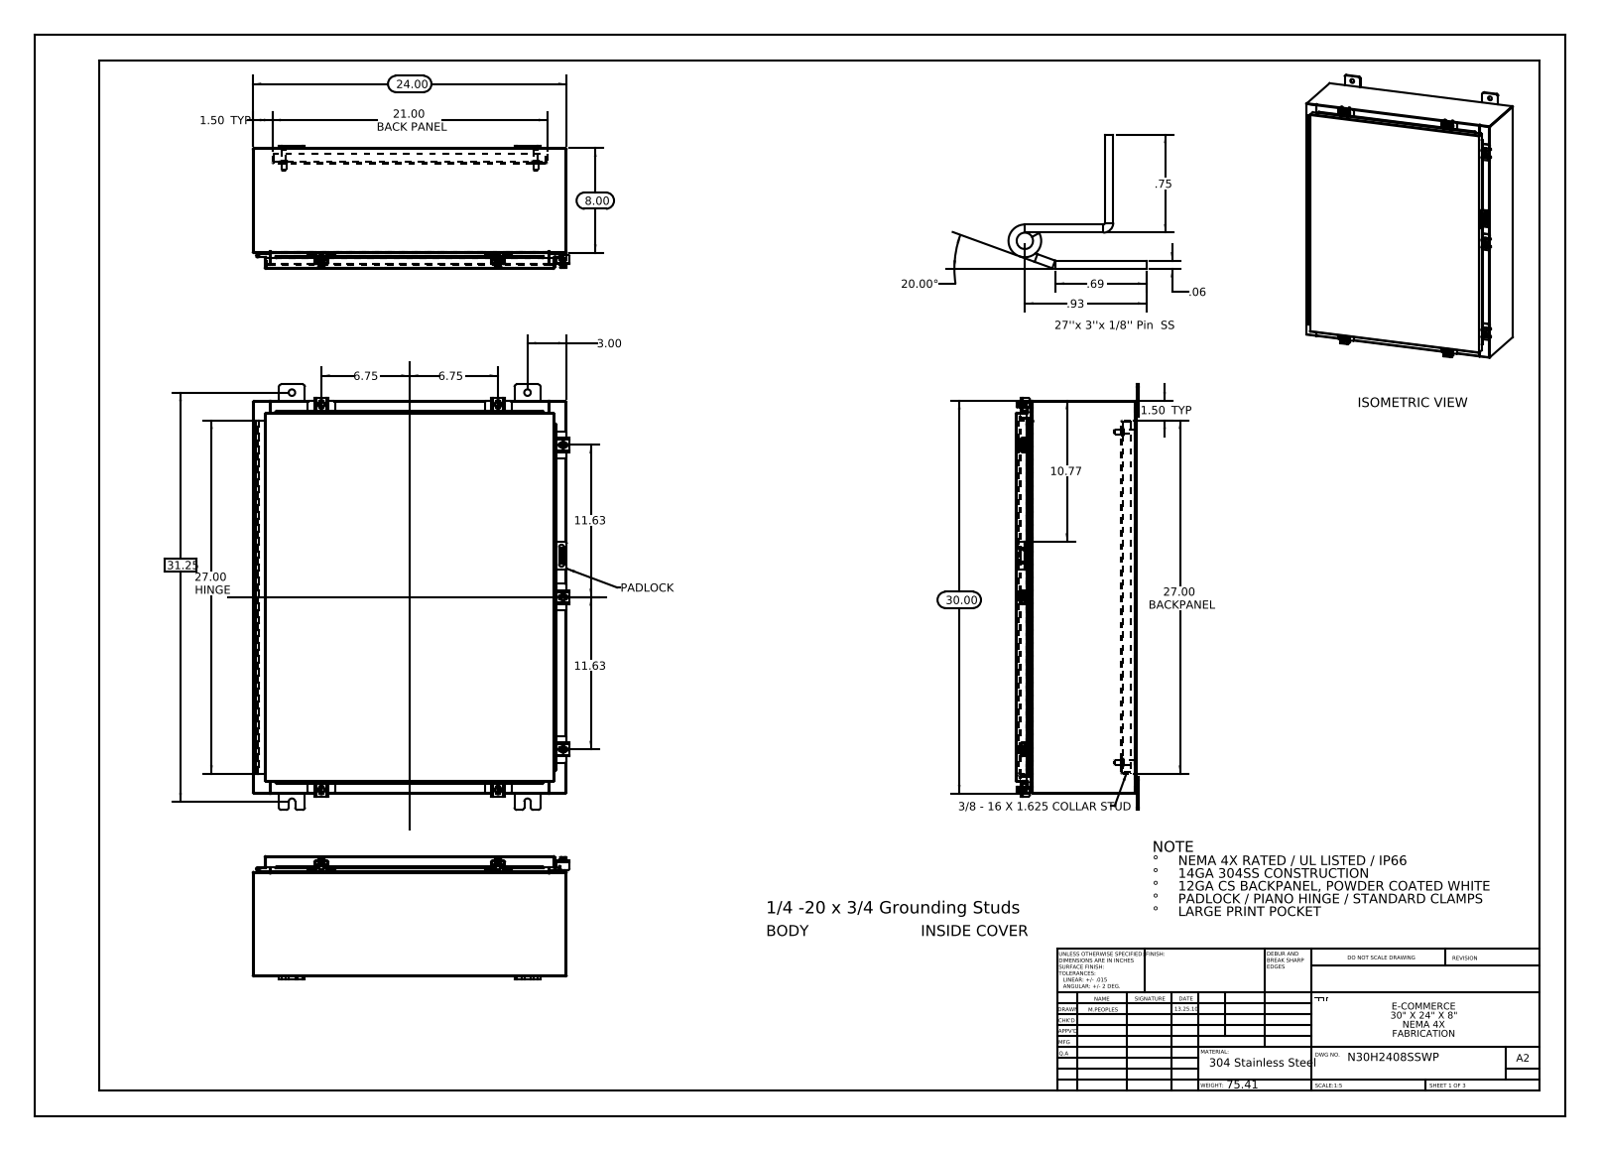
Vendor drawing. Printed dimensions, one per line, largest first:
31.25
30.00
27.00 HINGE
27.00 BACKPANEL
24.00
21.00 BACK PANEL
20.00°
11.63
11.63
10.77
8.00
6.75
6.75
3.00
1.50 TYP
1.50 TYP
.93
.75
.69
.06
